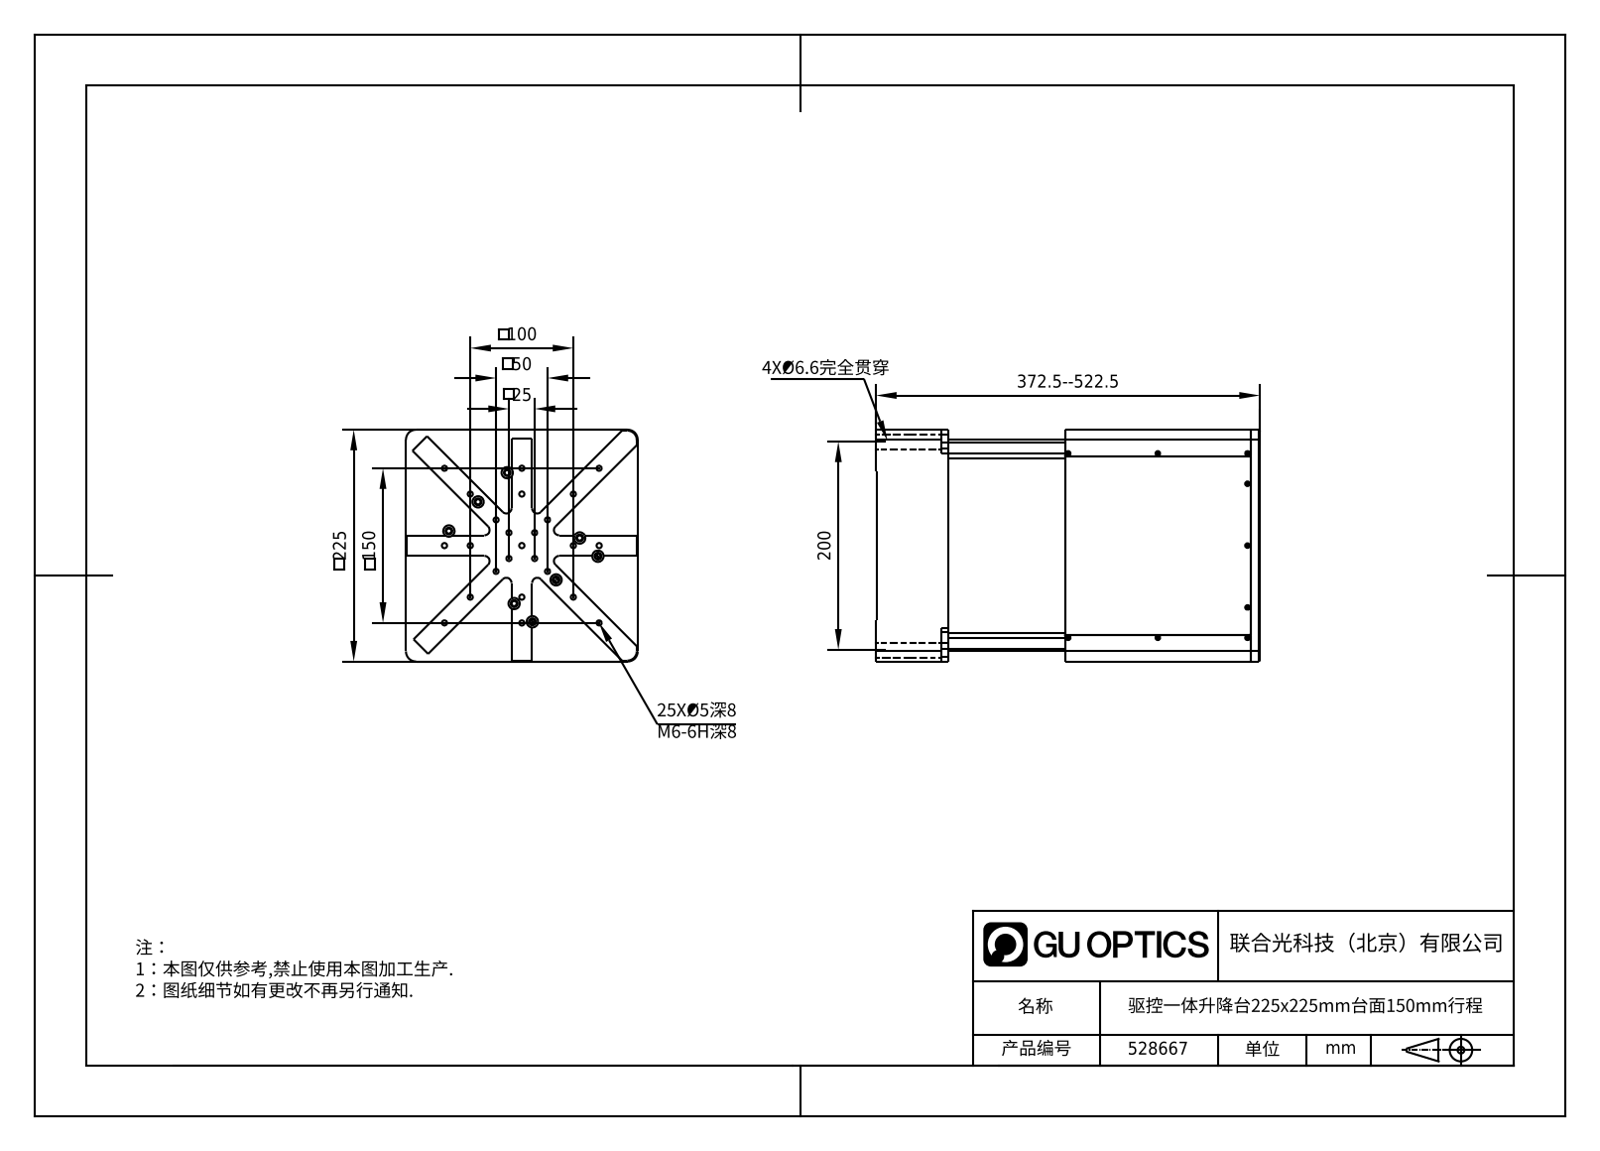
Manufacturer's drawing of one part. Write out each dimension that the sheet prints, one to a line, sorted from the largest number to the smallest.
372.5--522.5
225
200
150
100
50
25
